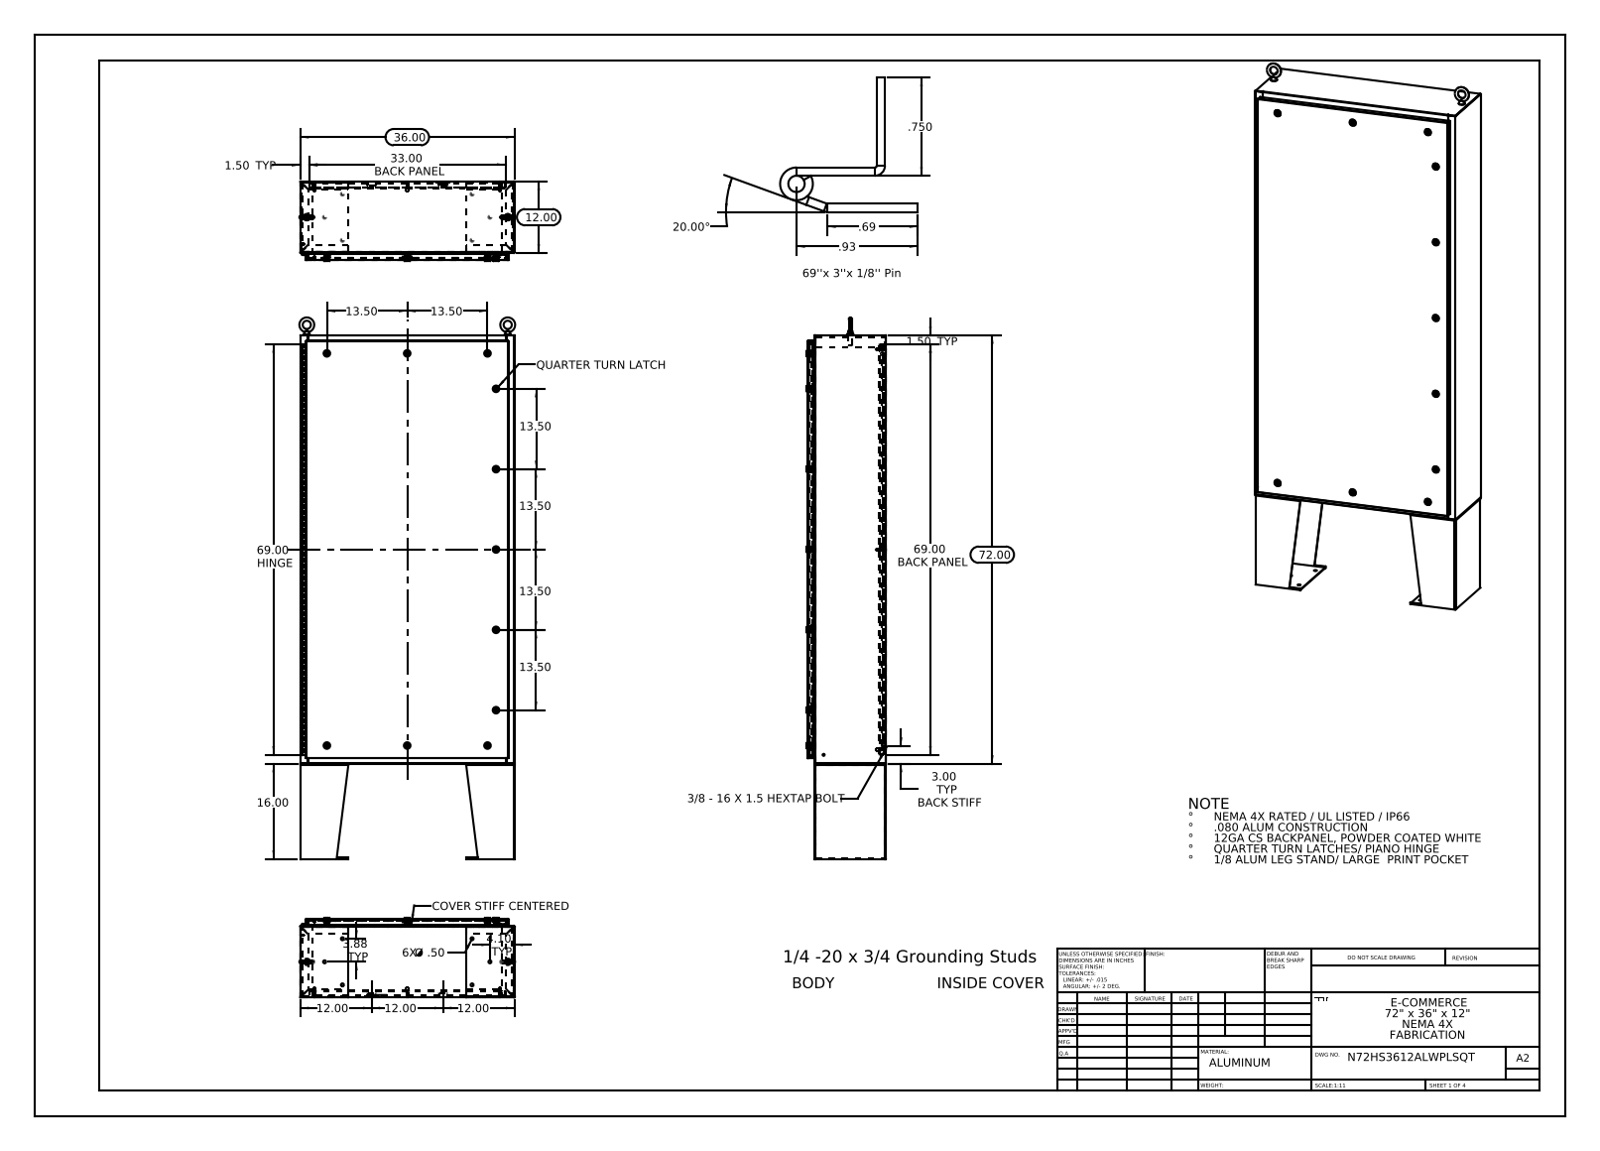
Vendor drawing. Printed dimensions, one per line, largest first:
72.00
69.00 HINGE
69.00 BACK PANEL
36.00
33.00 BACK PANEL
20.00°
16.00
13.50
13.50
13.50
13.50
13.50
13.50
12.00
12.00
12.00
12.00
4.10 TYP
3.88 TYP
3.00 TYP BACK STIFF
1.50 TYP
1.50 TYP
.93
.750
.69
6X Ø .50
